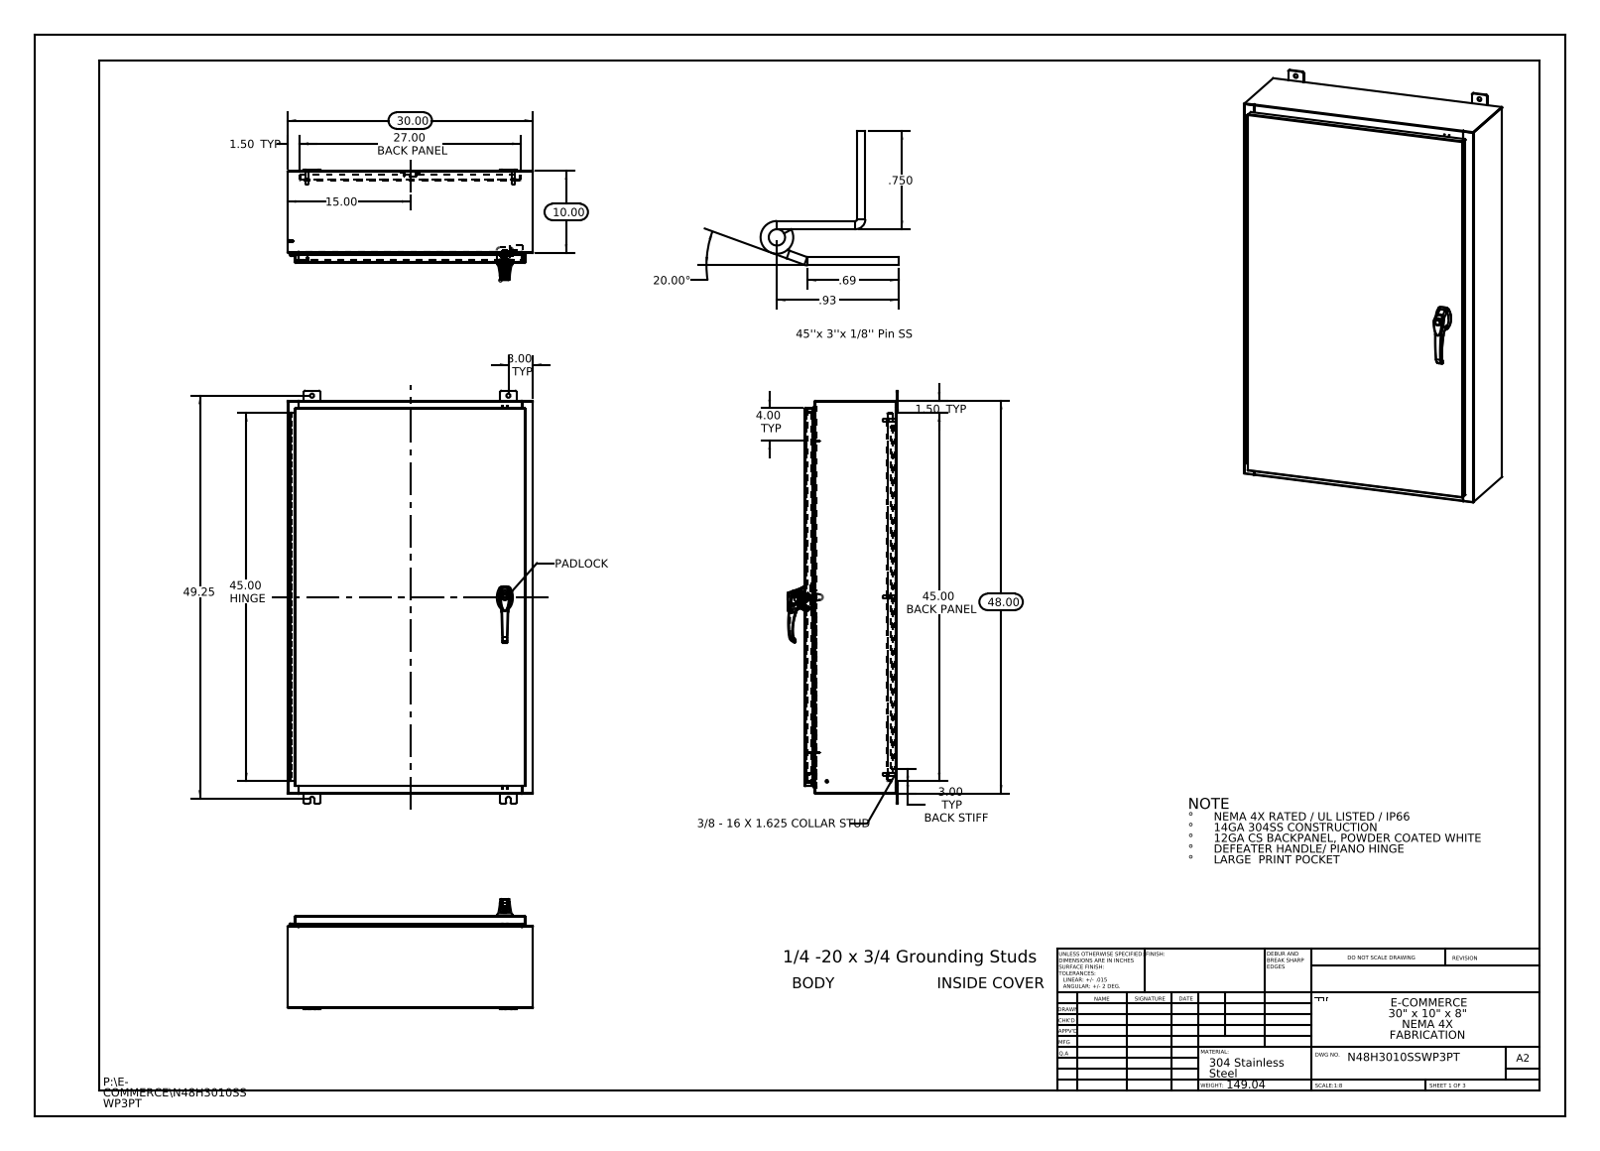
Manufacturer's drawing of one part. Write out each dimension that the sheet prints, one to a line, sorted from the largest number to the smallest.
49.25
48.00
45.00 HINGE
45.00 BACK PANEL
30.00
27.00 BACK PANEL
20.00°
15.00
10.00
4.00 TYP
3.00 TYP
3.00 TYP BACK STIFF
1.50 TYP
1.50 TYP
.93
.750
.69
